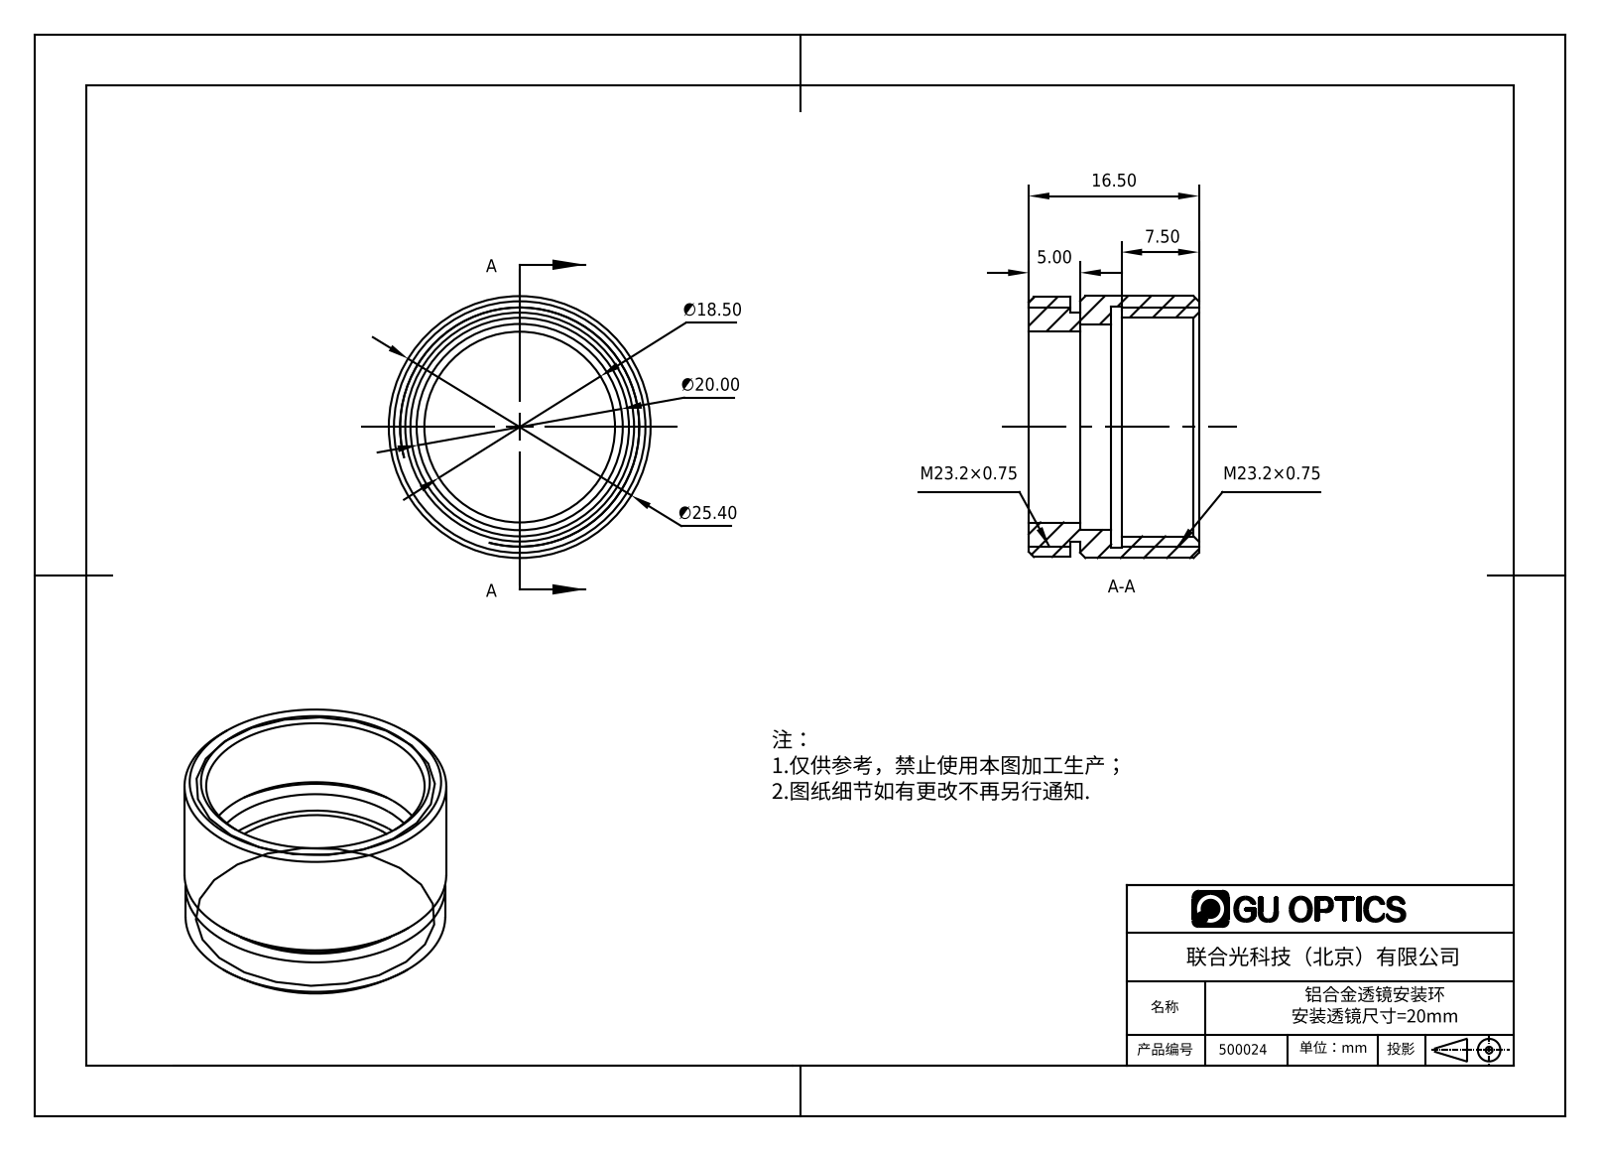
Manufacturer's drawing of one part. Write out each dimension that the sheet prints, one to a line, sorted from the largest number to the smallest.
∅25.40
∅20.00
∅18.50
16.50
7.50
5.00
